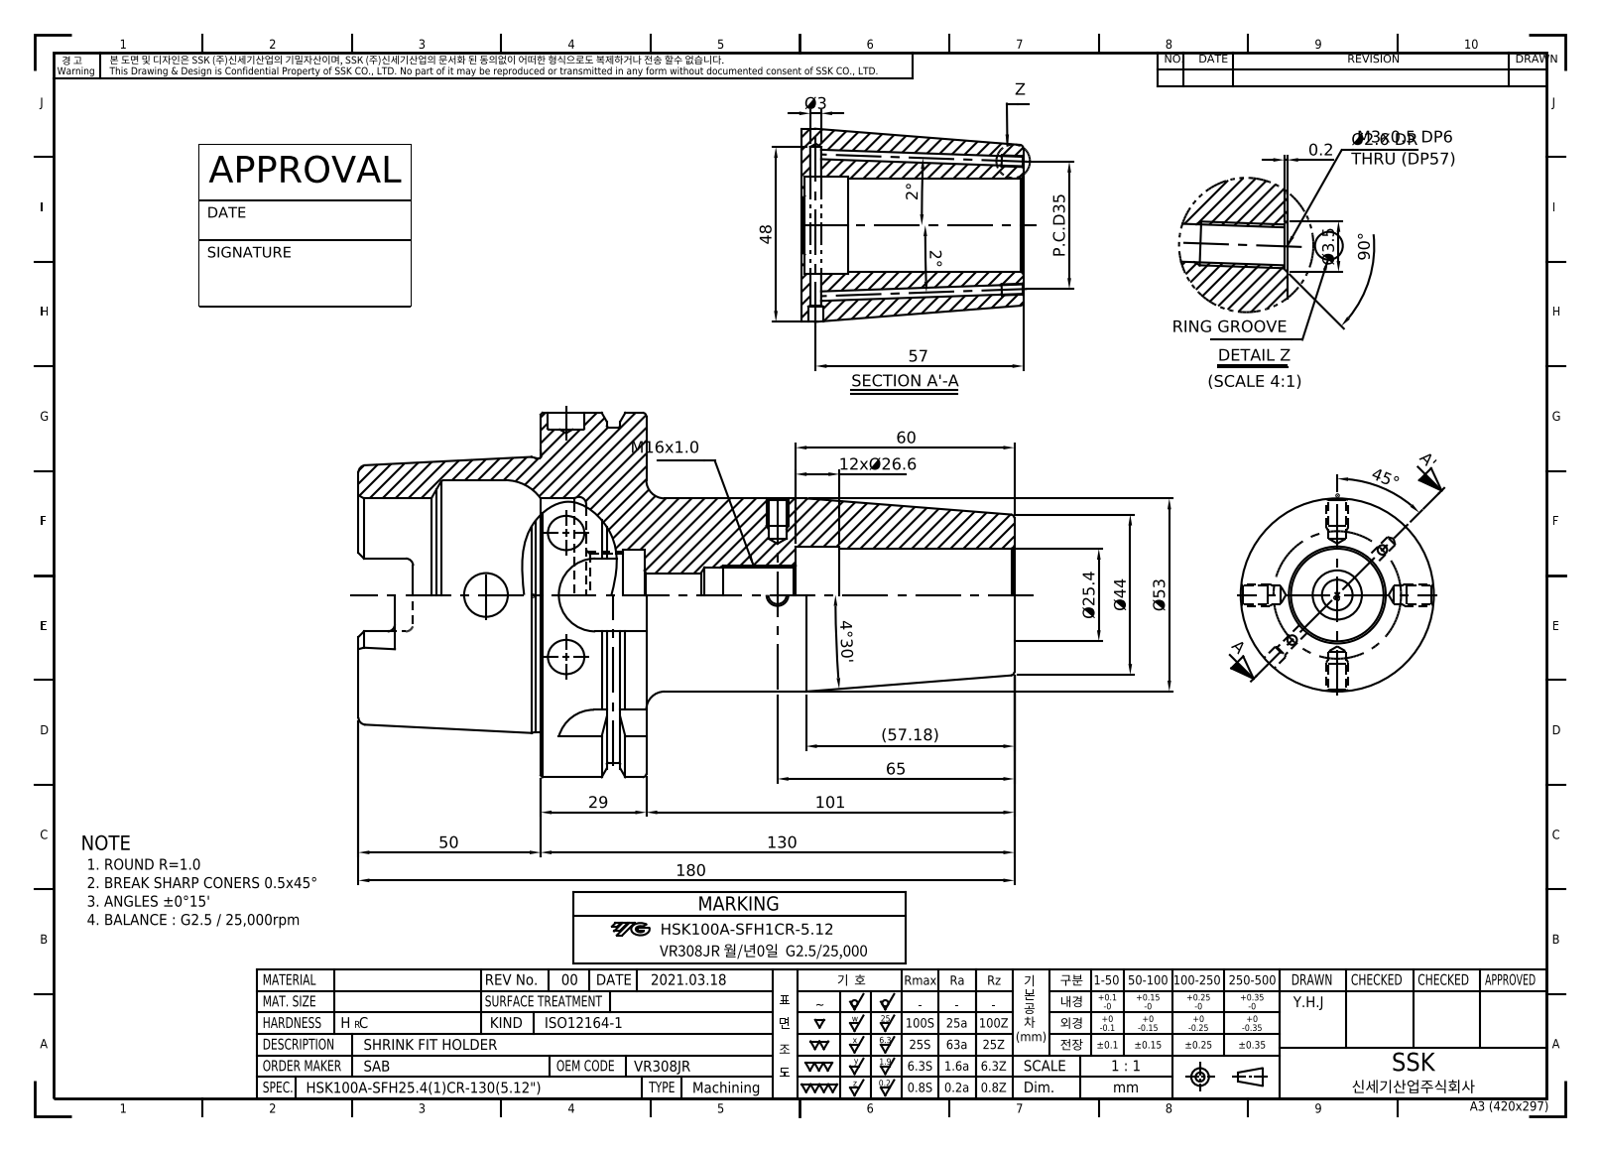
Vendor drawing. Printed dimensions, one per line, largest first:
180
130
101
90°
65
60
(57.18)
57
Ø53
50
48
45°
Ø44
P.C.D35
29
12xØ26.6
Ø25.4
4°30'
Ø3.5
Ø3
2°
2°
0.2
